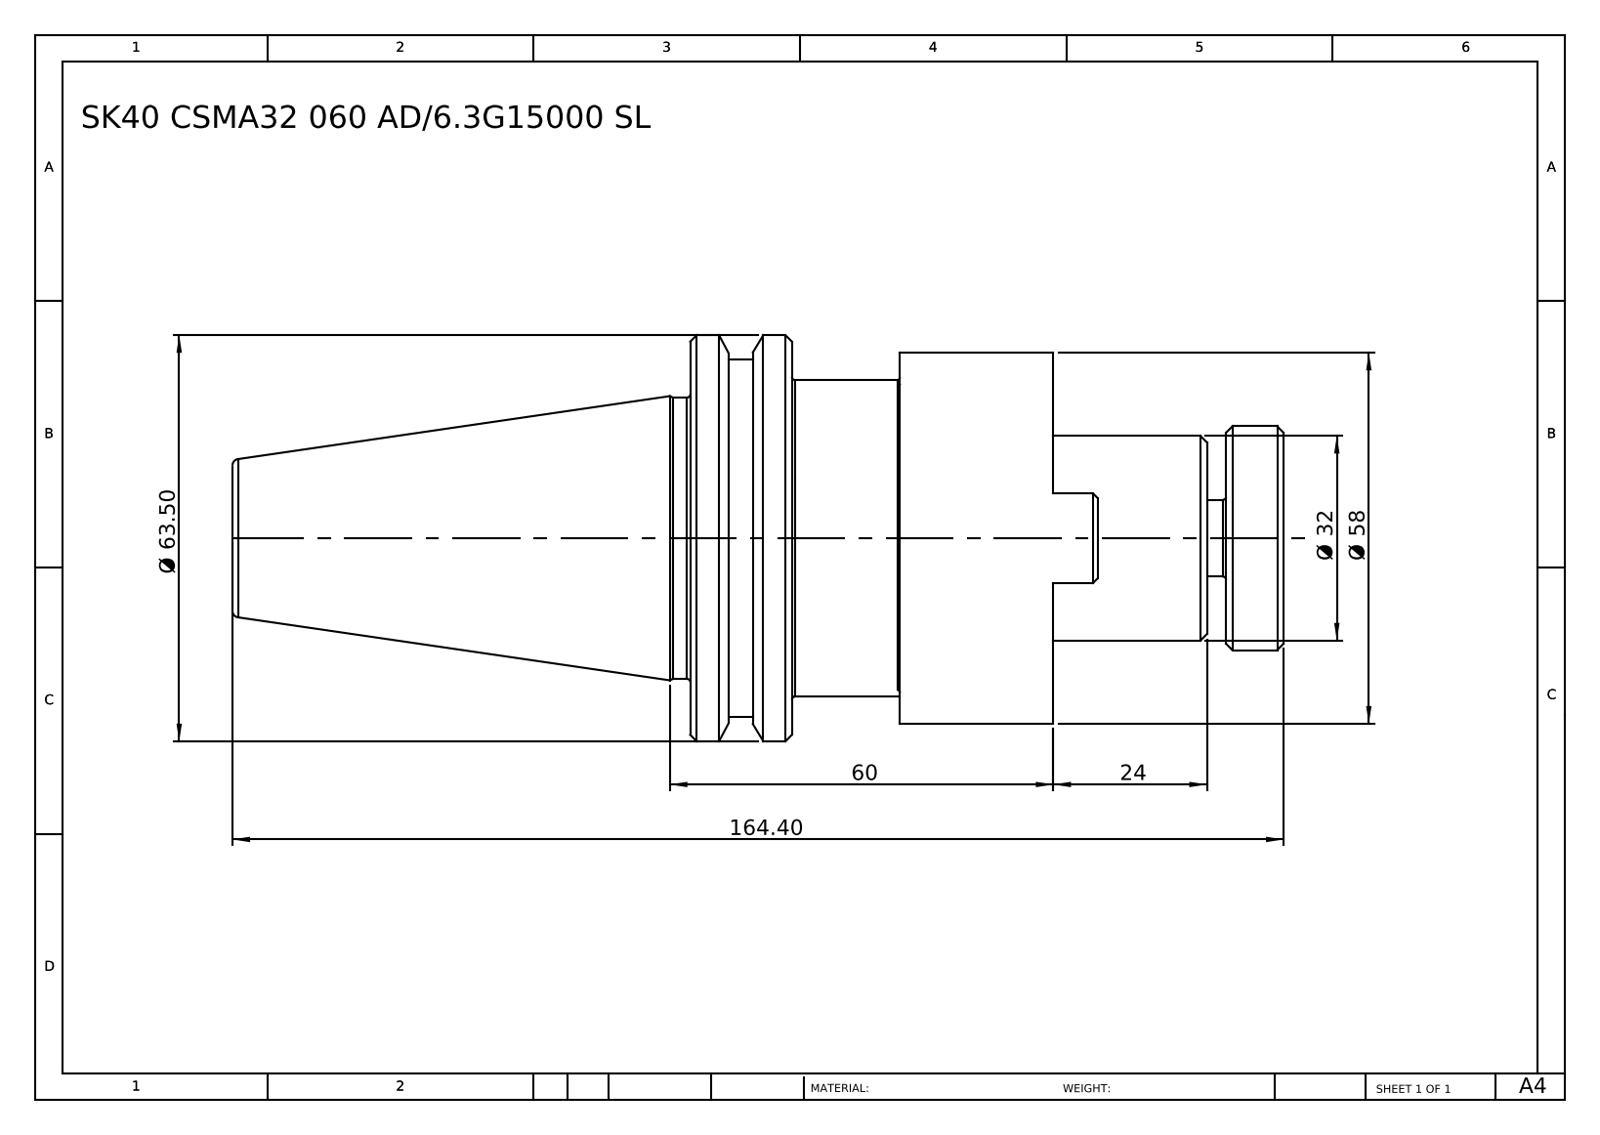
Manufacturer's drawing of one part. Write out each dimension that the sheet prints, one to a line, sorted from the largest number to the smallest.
164.40
Ø 63.50
60
Ø 58
Ø 32
24
